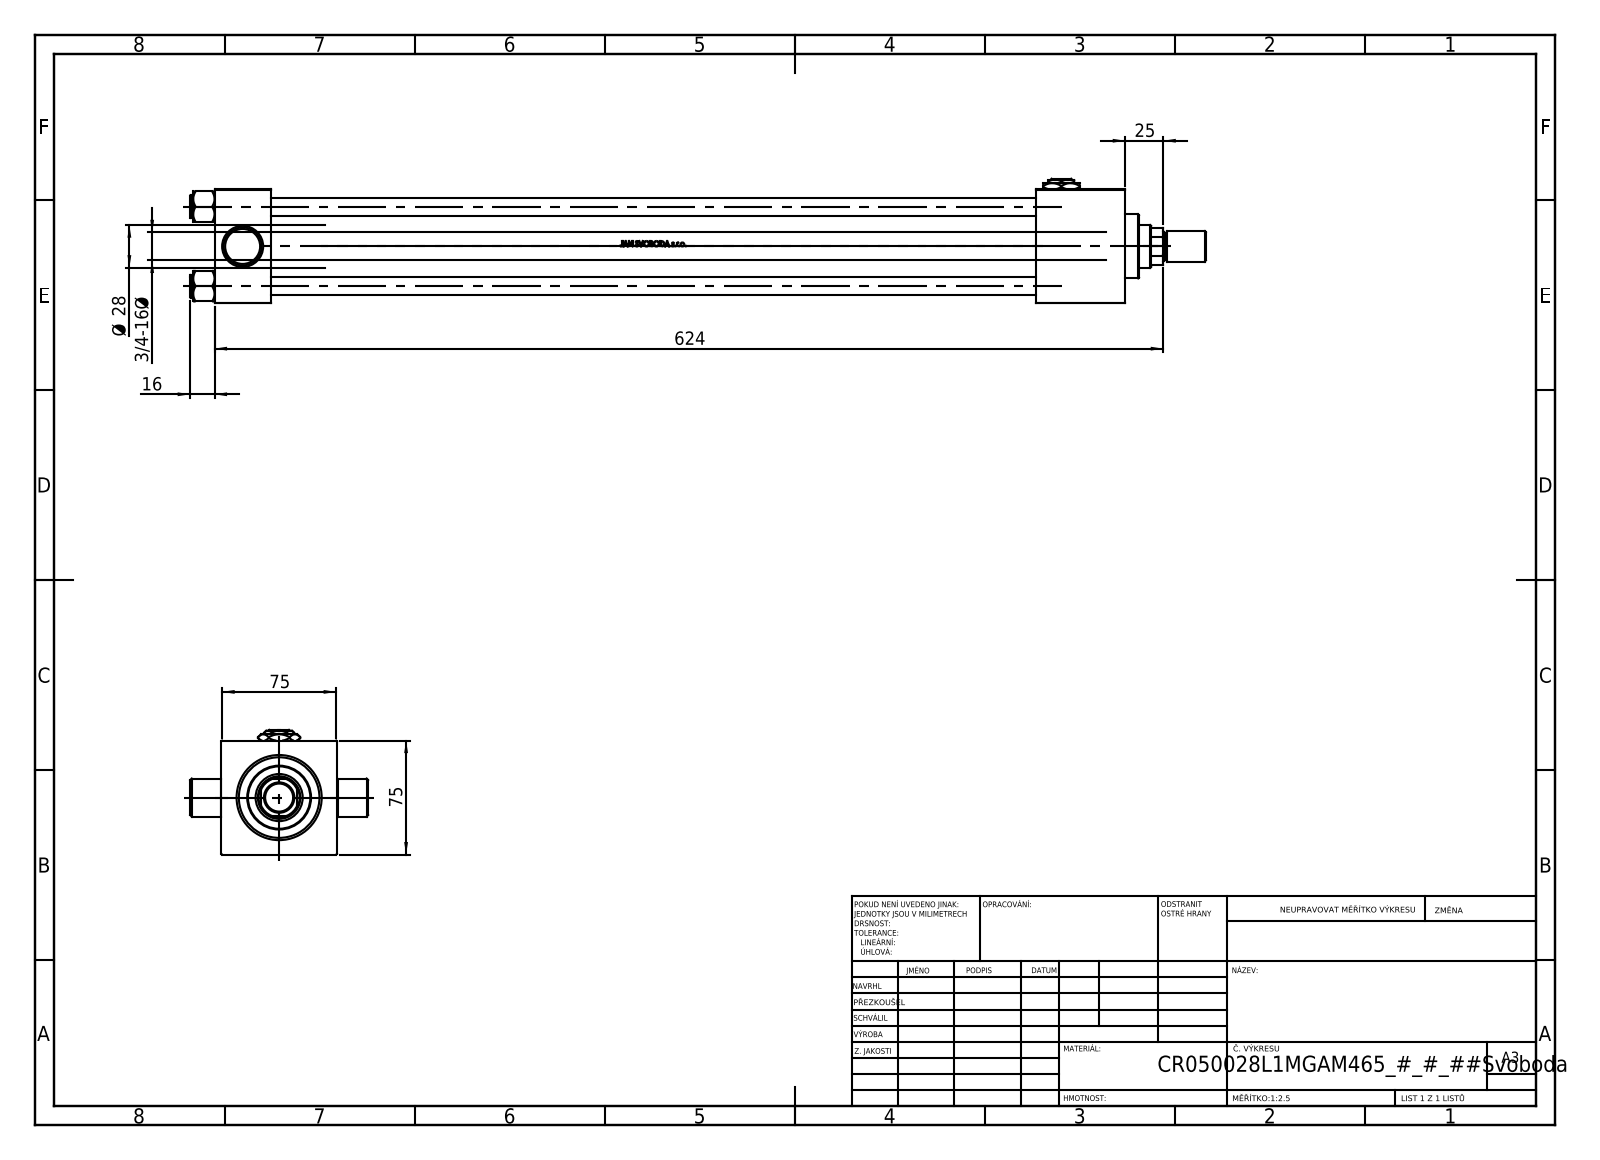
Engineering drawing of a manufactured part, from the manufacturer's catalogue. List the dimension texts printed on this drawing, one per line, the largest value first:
624
75
75
Ø 28
25
16
3/4-16 Ø
